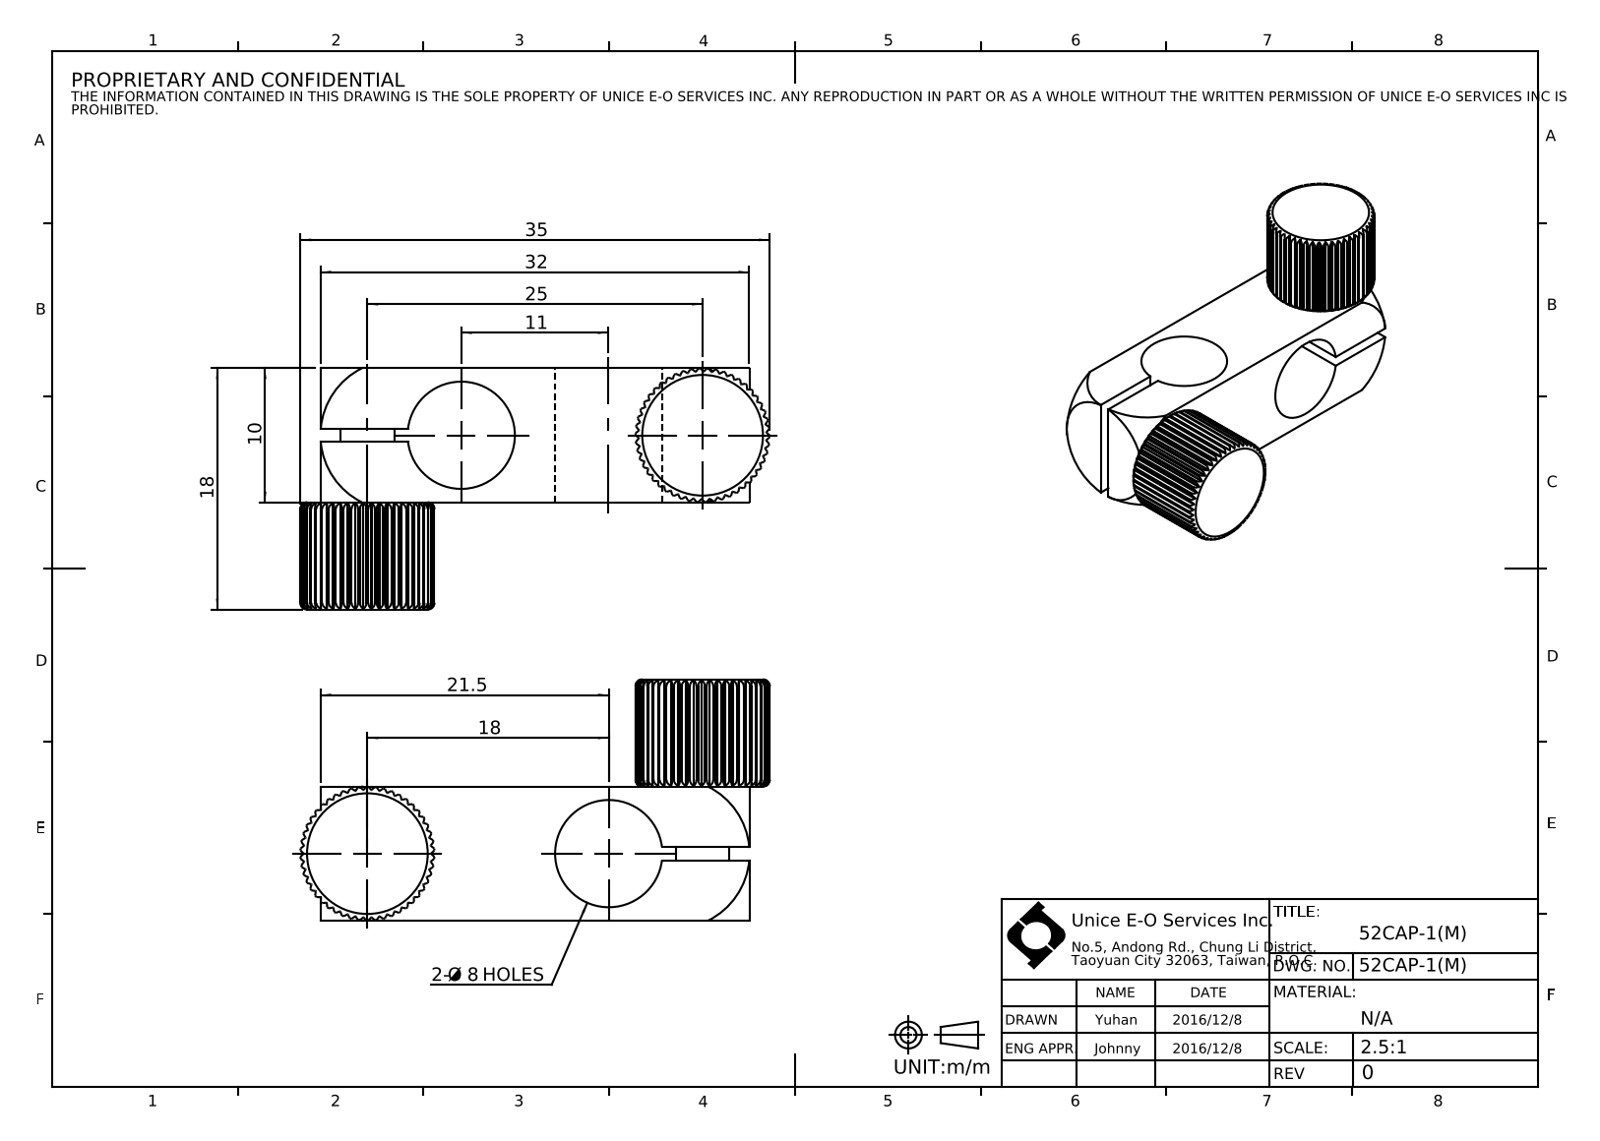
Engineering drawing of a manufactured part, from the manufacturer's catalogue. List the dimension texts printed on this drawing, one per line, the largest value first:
35
32
25
21.5
18
18
11
10
2- Ø 8 HOLES
